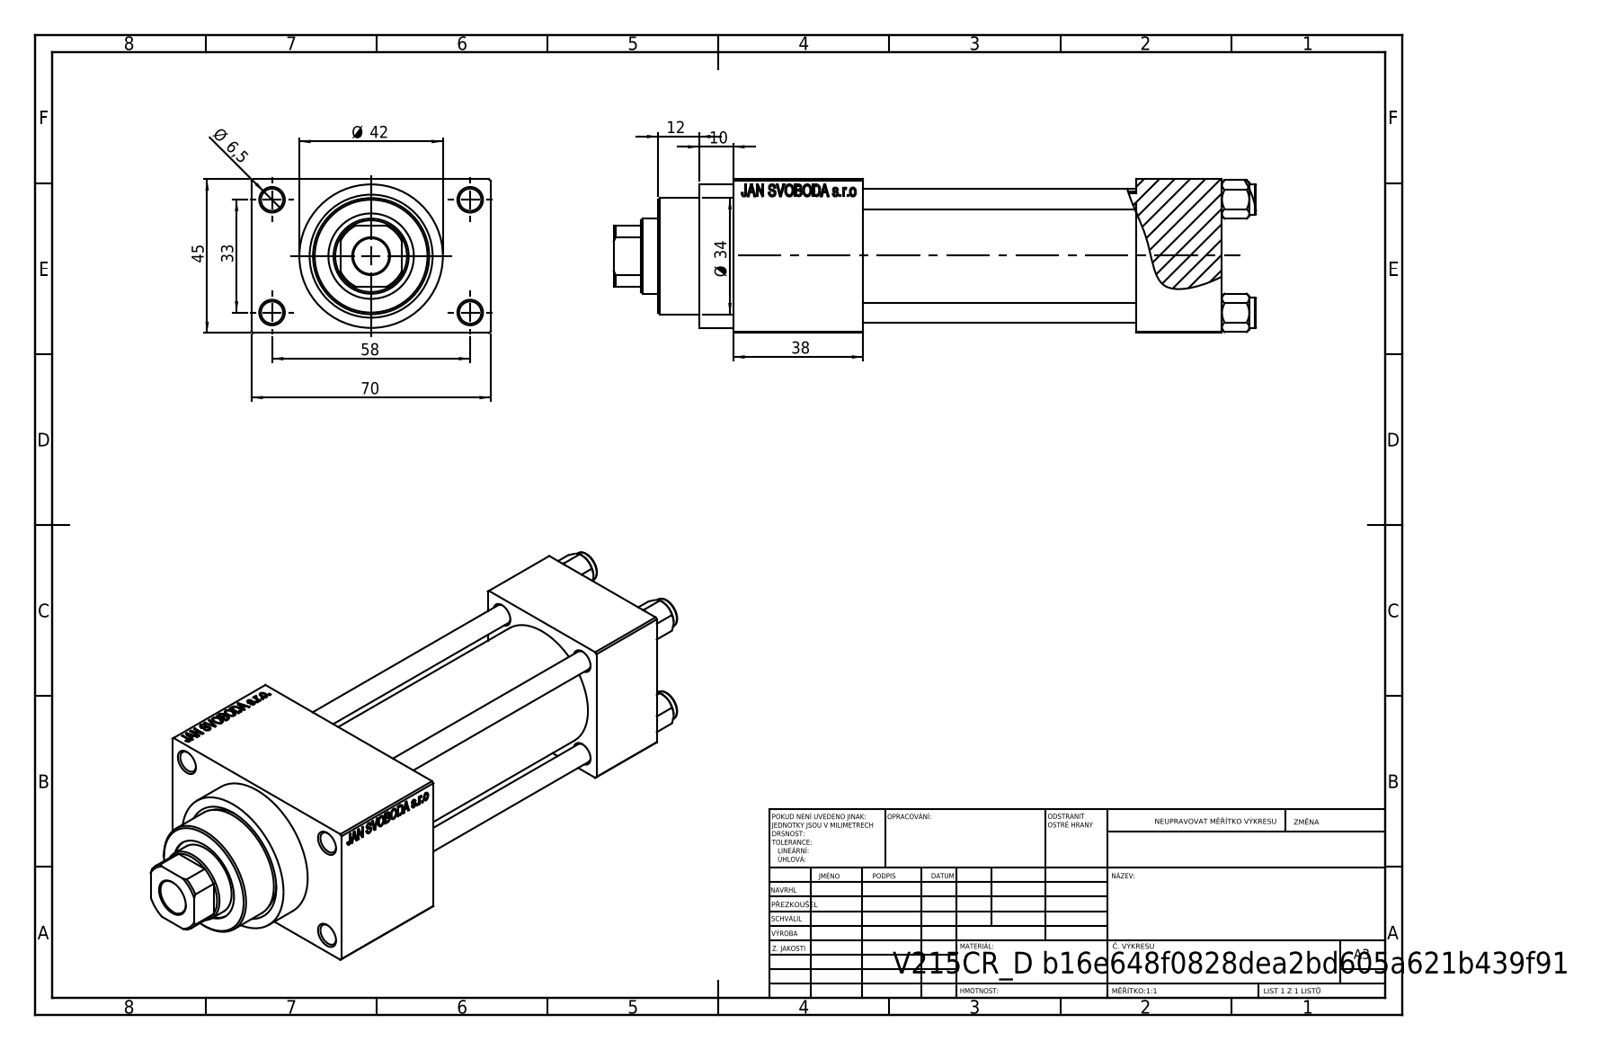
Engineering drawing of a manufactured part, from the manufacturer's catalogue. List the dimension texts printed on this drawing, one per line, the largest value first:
70
58
45
Ø 42
38
Ø 34
33
12
10
Ø 6,5
